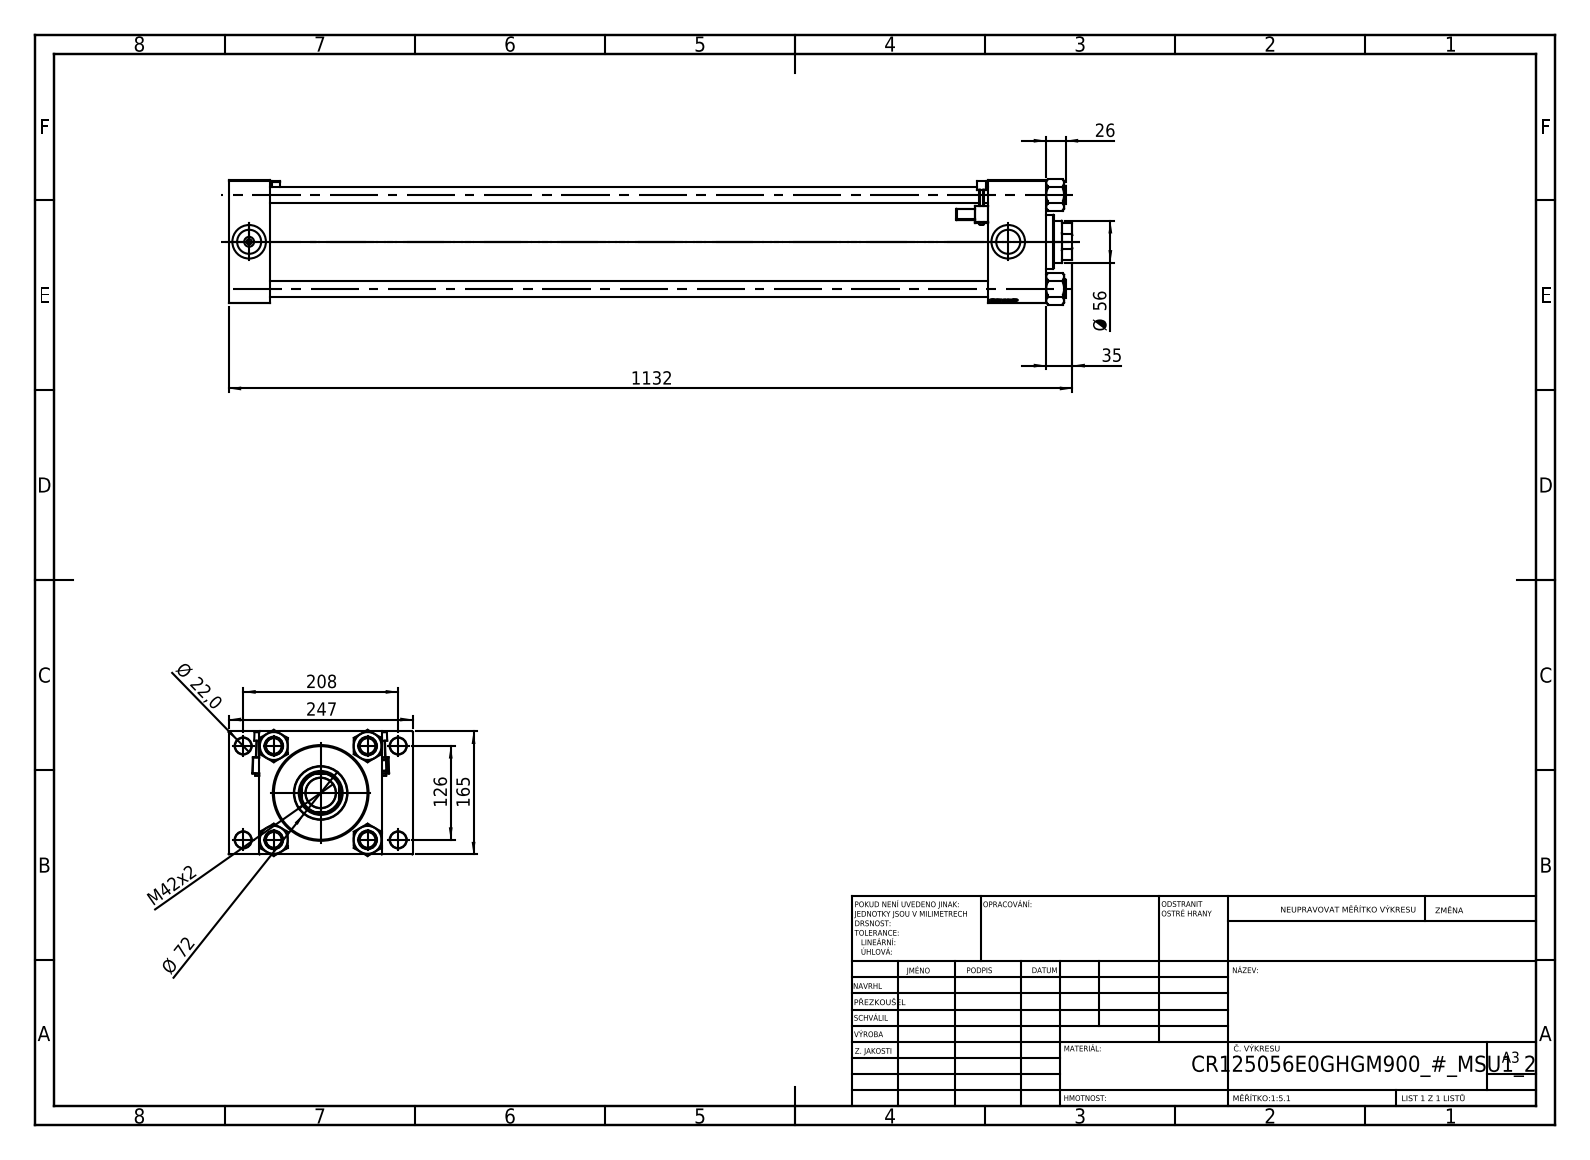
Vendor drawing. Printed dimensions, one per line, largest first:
1132
247
208
165
126
Ø 72
Ø 56
M42x2
35
26
Ø 22,0
